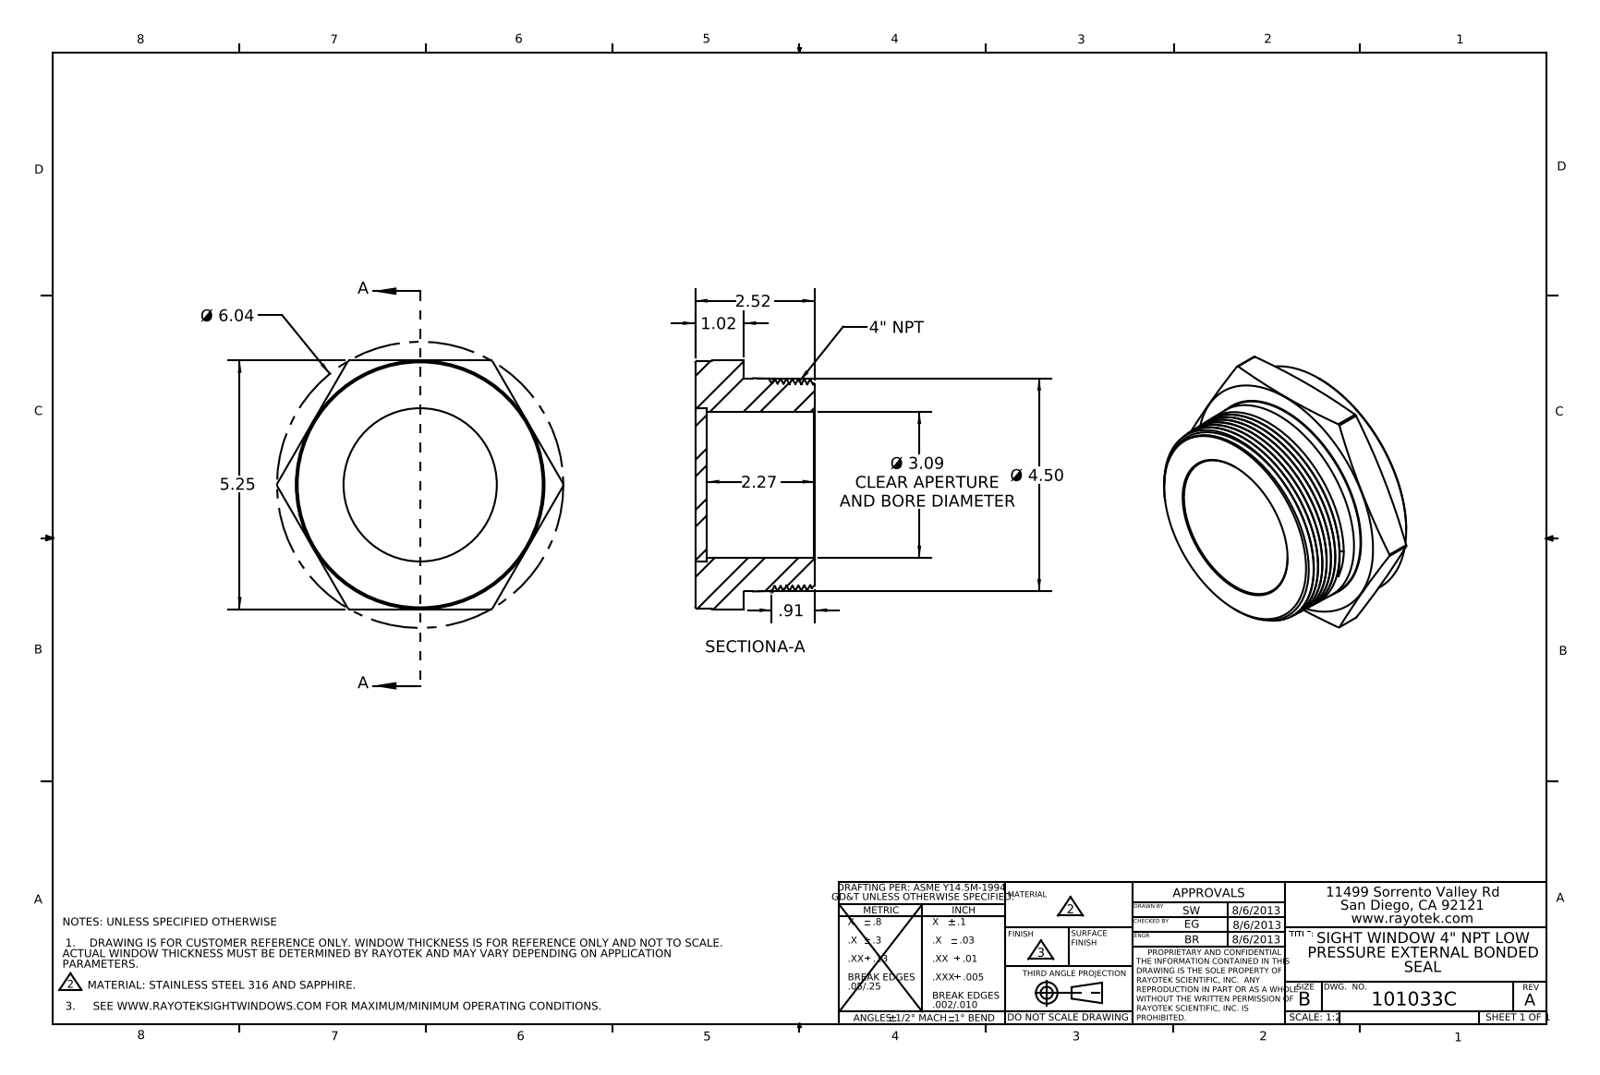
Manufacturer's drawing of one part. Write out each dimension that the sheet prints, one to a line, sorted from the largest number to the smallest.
Ø 6.04
5.25
Ø 4.50
Ø 3.09 CLEAR APERTURE AND BORE DIAMETER
2.52
2.27
1.02
.91
